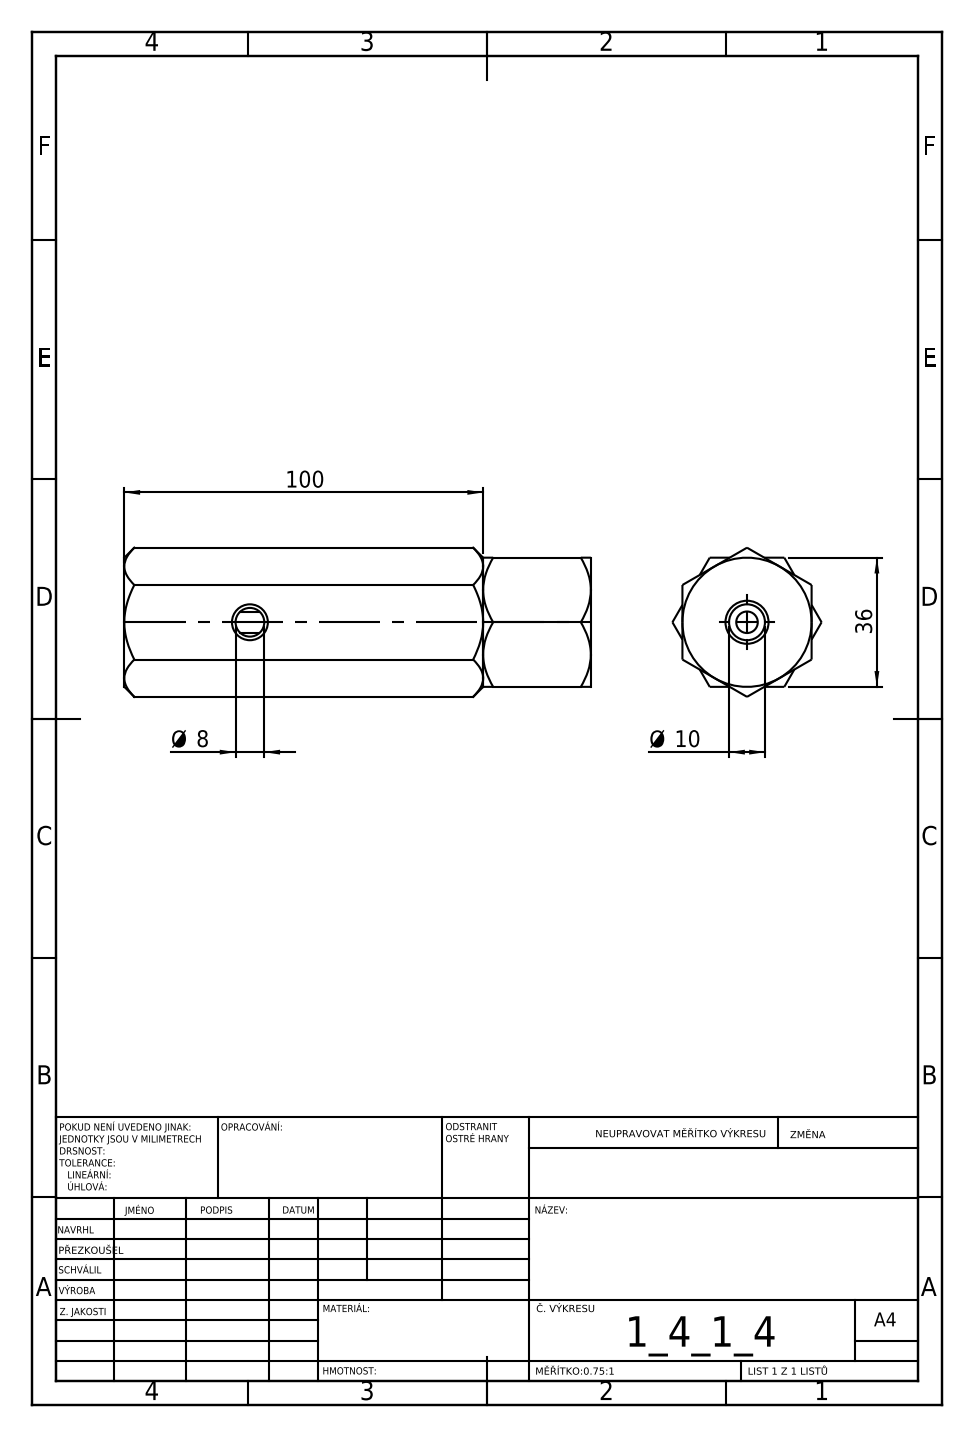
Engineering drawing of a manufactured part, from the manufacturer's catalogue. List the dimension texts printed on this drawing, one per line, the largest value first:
100
36
Ø 10
Ø 8
